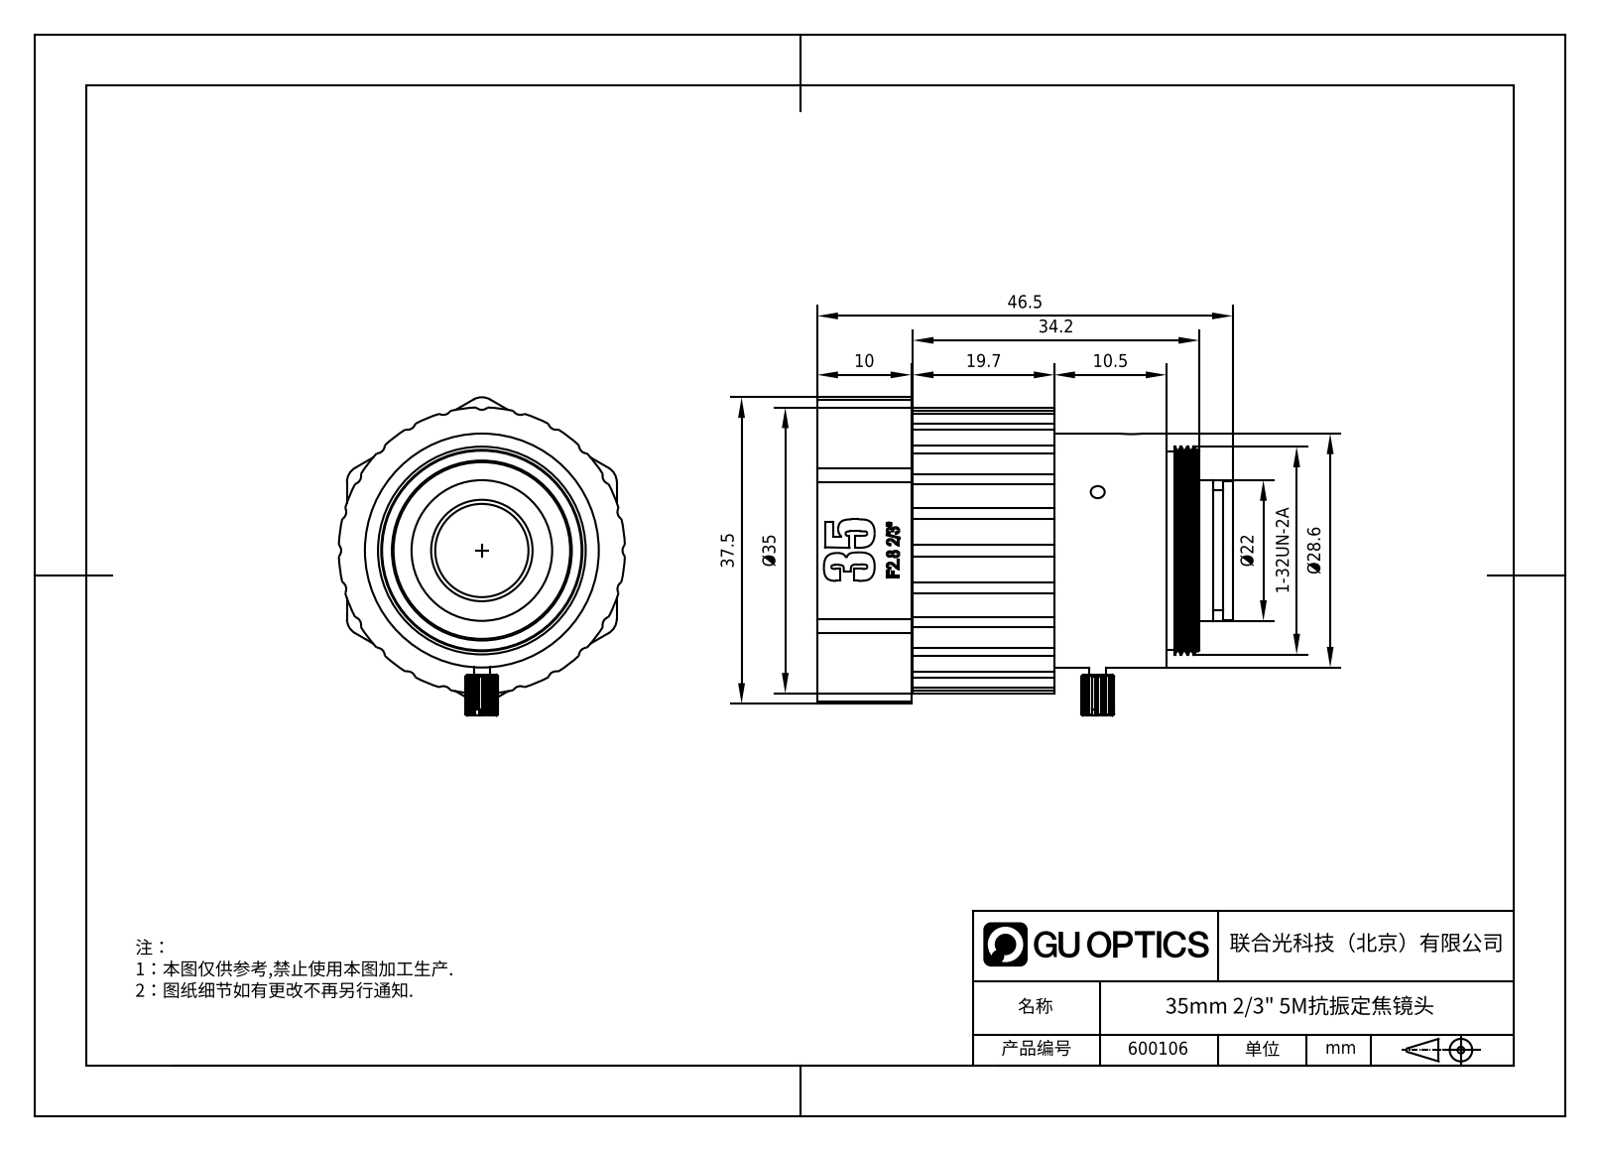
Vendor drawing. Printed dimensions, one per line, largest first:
46.5
37.5
Ø35
34.2
Ø28.6
Ø22
19.7
10.5
10
1-32UN-2A
